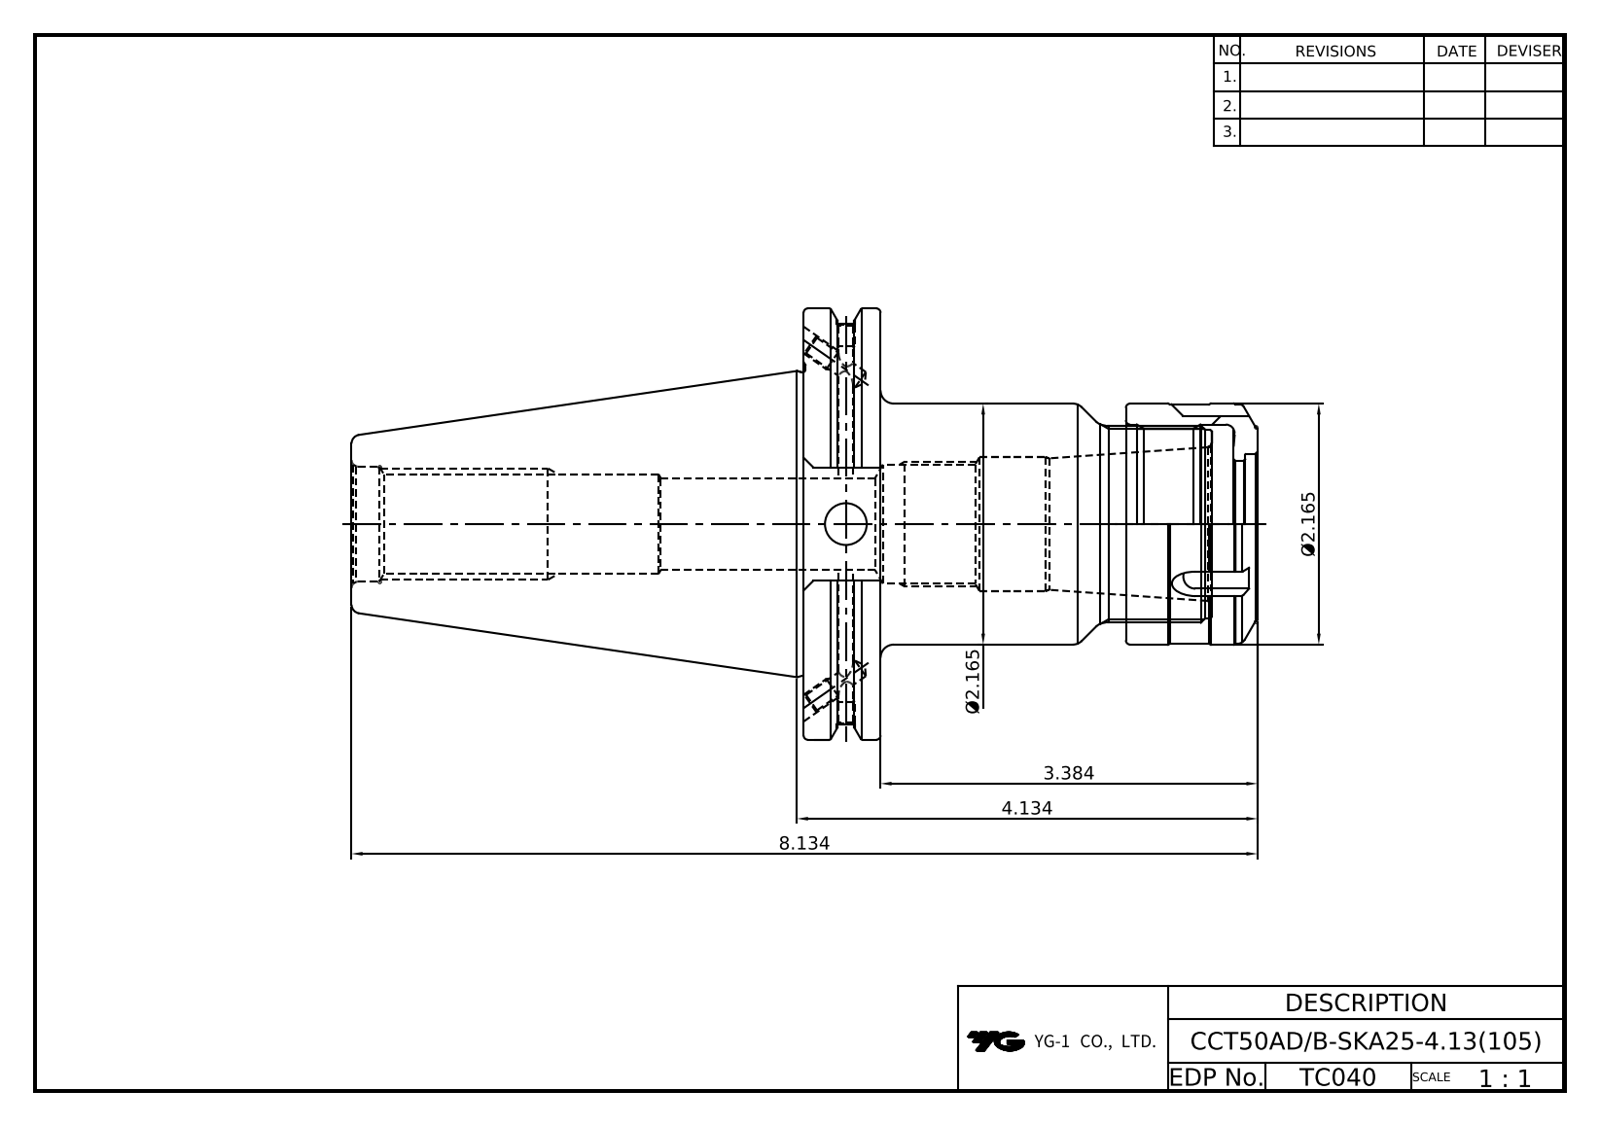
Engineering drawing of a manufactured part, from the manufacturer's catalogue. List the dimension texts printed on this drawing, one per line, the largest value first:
8.134
4.134
3.384
Ø2.165
Ø2.165
